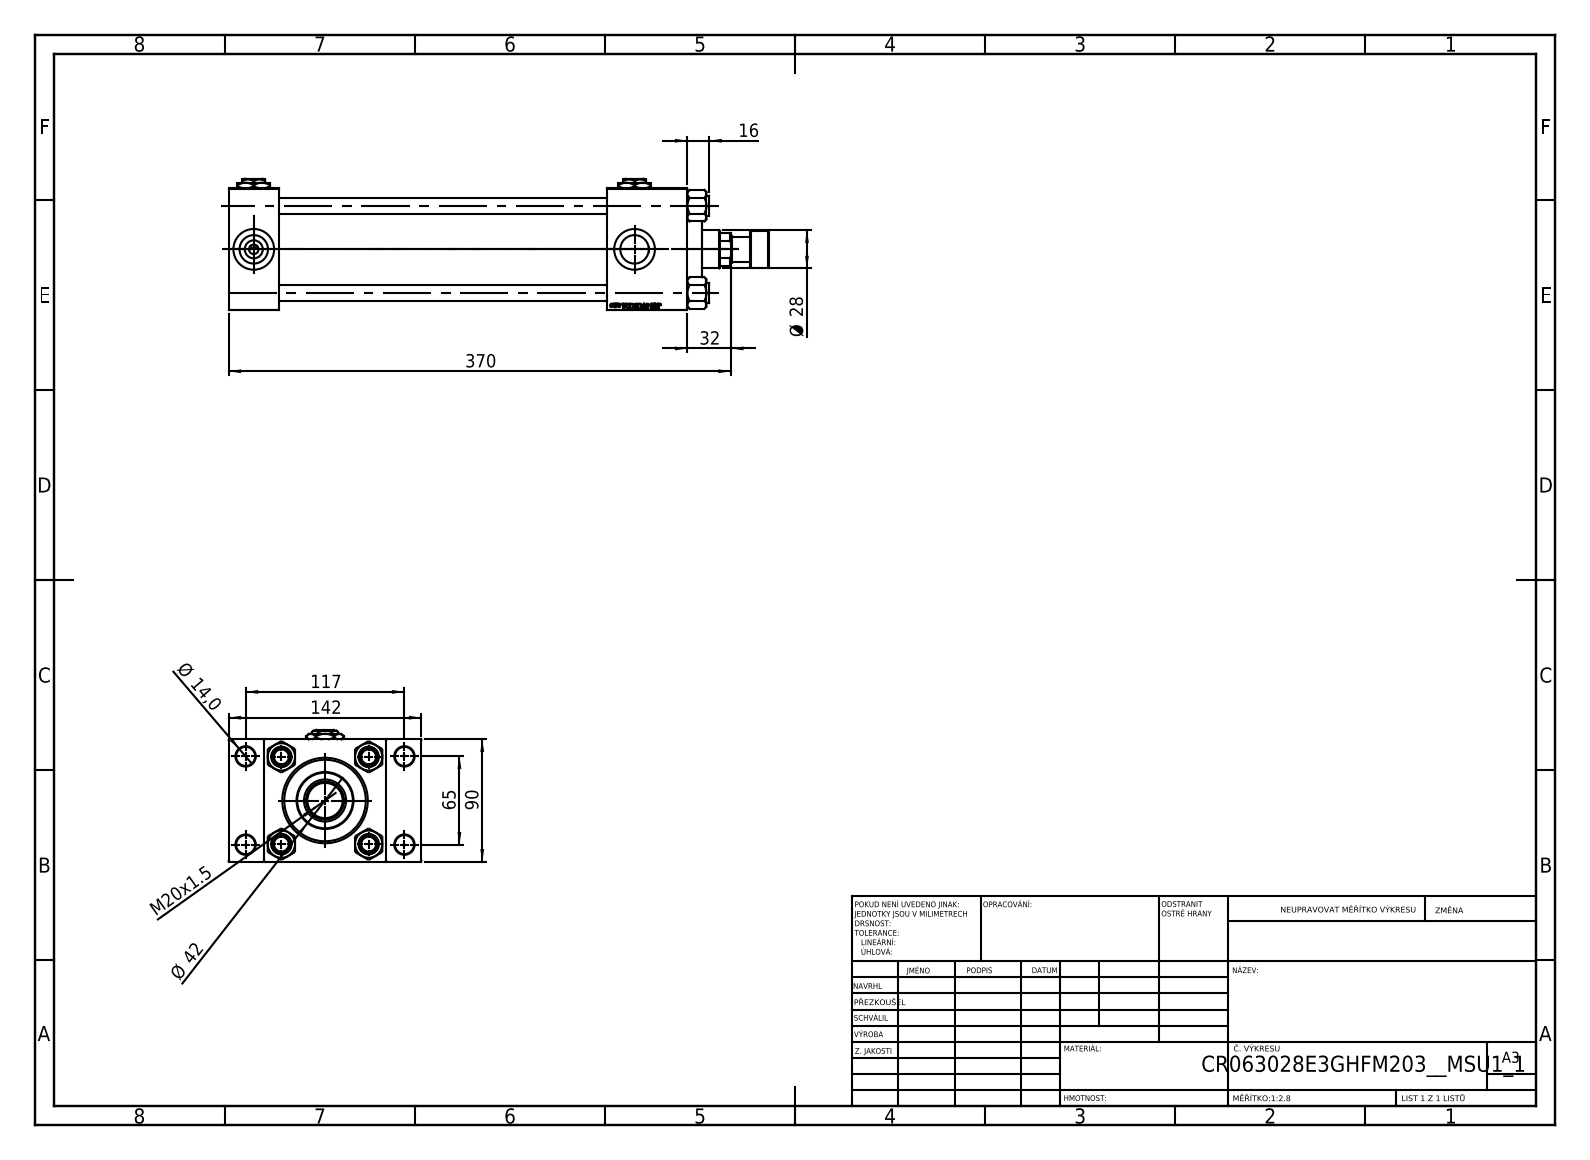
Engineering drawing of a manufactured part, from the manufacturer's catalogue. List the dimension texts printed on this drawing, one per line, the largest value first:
370
142
117
90
65
Ø 42
32
Ø 28
M20x1.5
16
Ø 14,0
